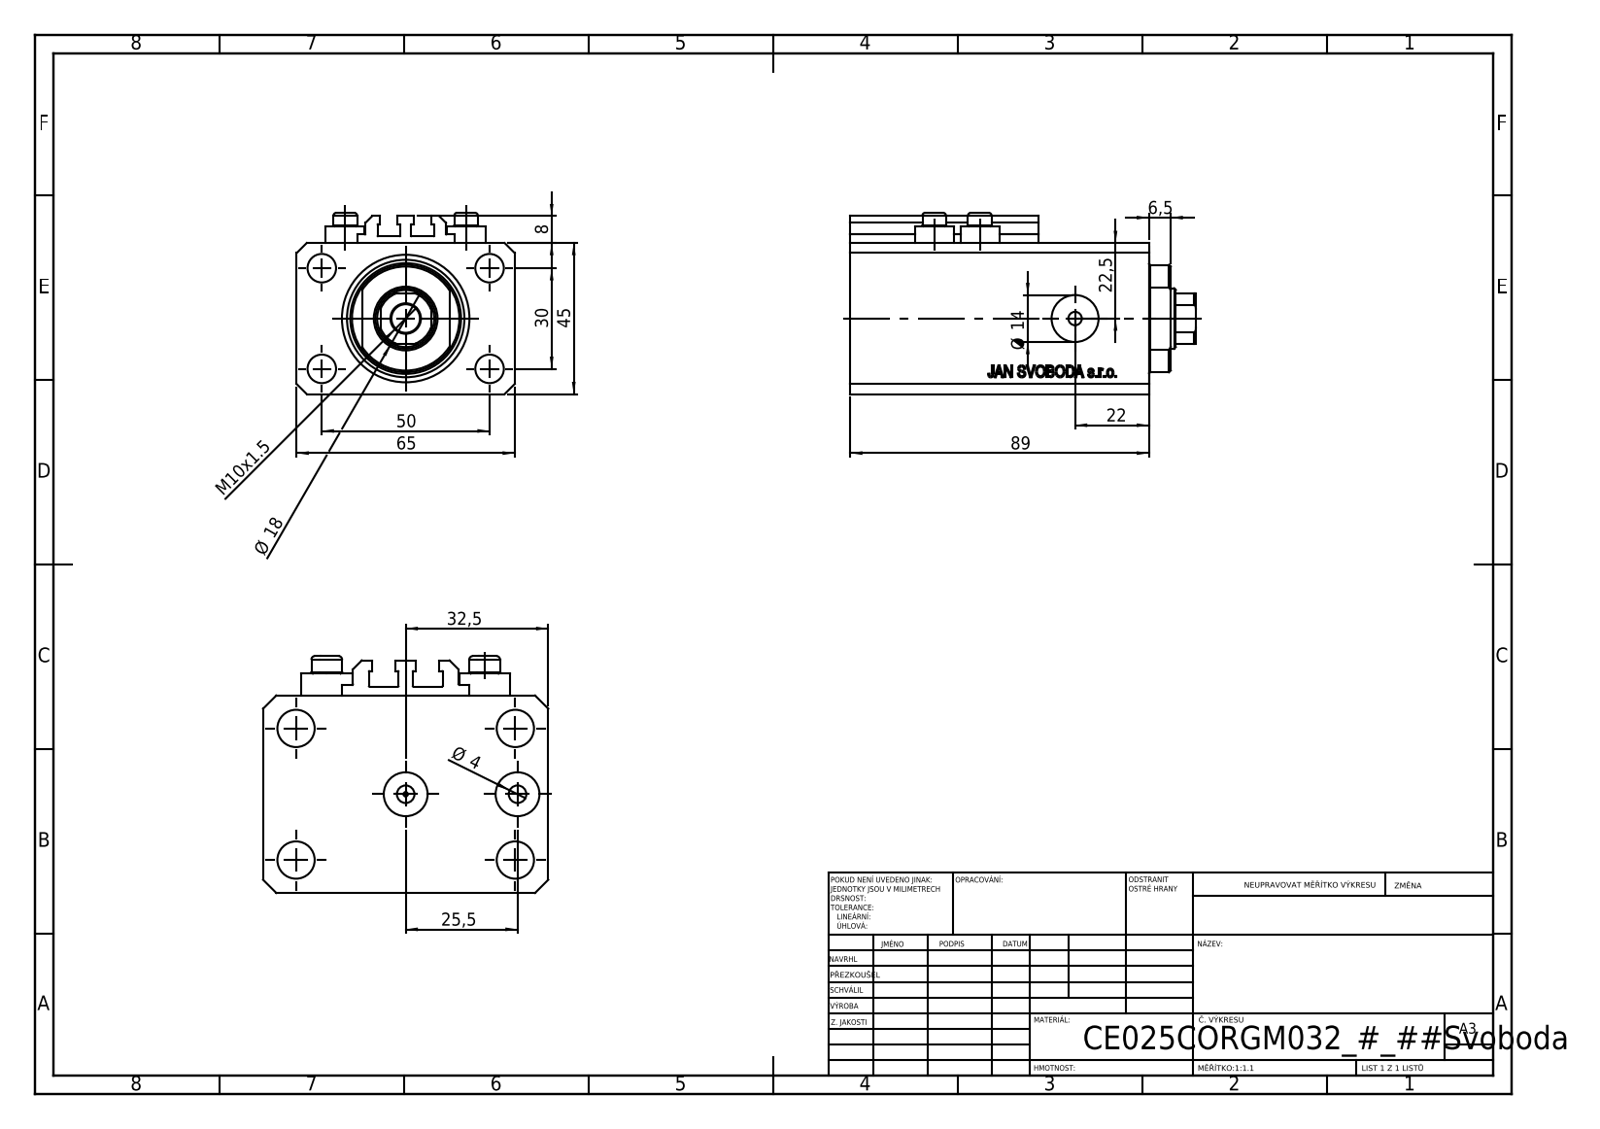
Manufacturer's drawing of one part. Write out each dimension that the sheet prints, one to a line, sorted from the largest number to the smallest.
89
65
50
45
32,5
30
25,5
22,5
22
Ø 18
Ø 14
M10x1.5
8
6,5
Ø 4
